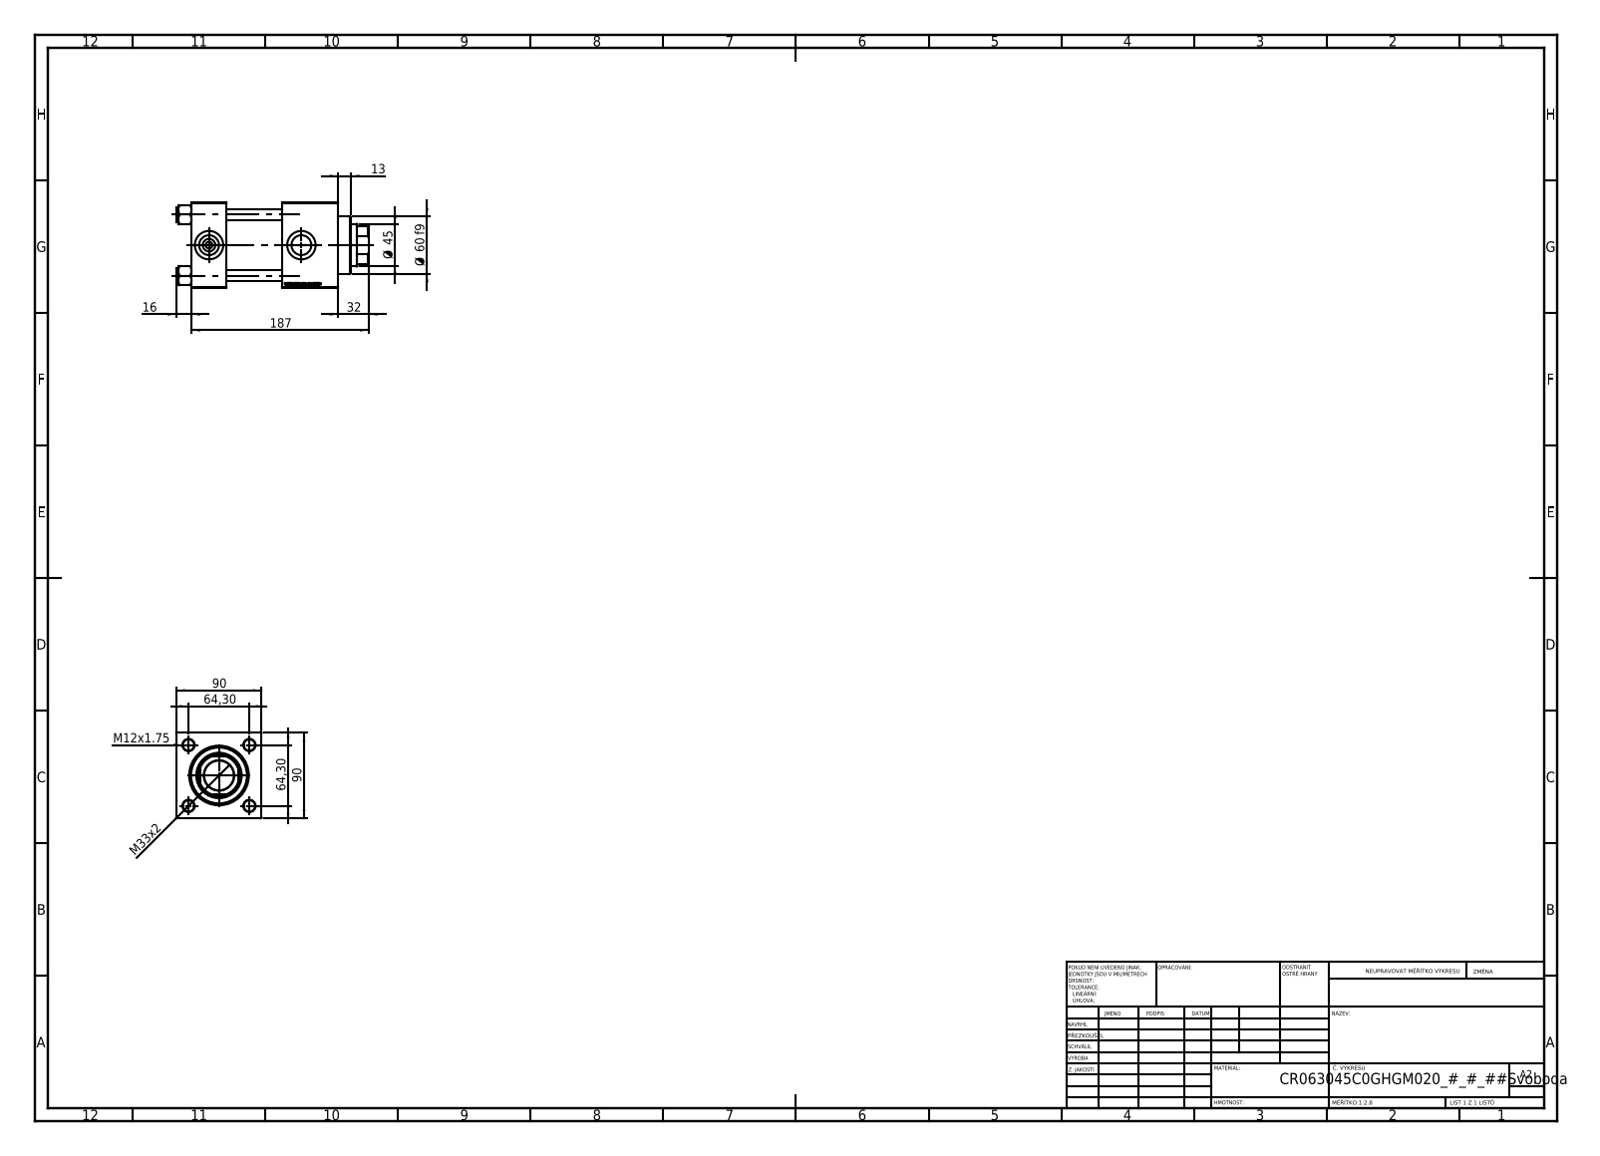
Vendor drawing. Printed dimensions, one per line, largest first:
187
90
90
64,30
64,30
Ø 60 f9
Ø 45
M33x2
32
16
13
M12x1.75
